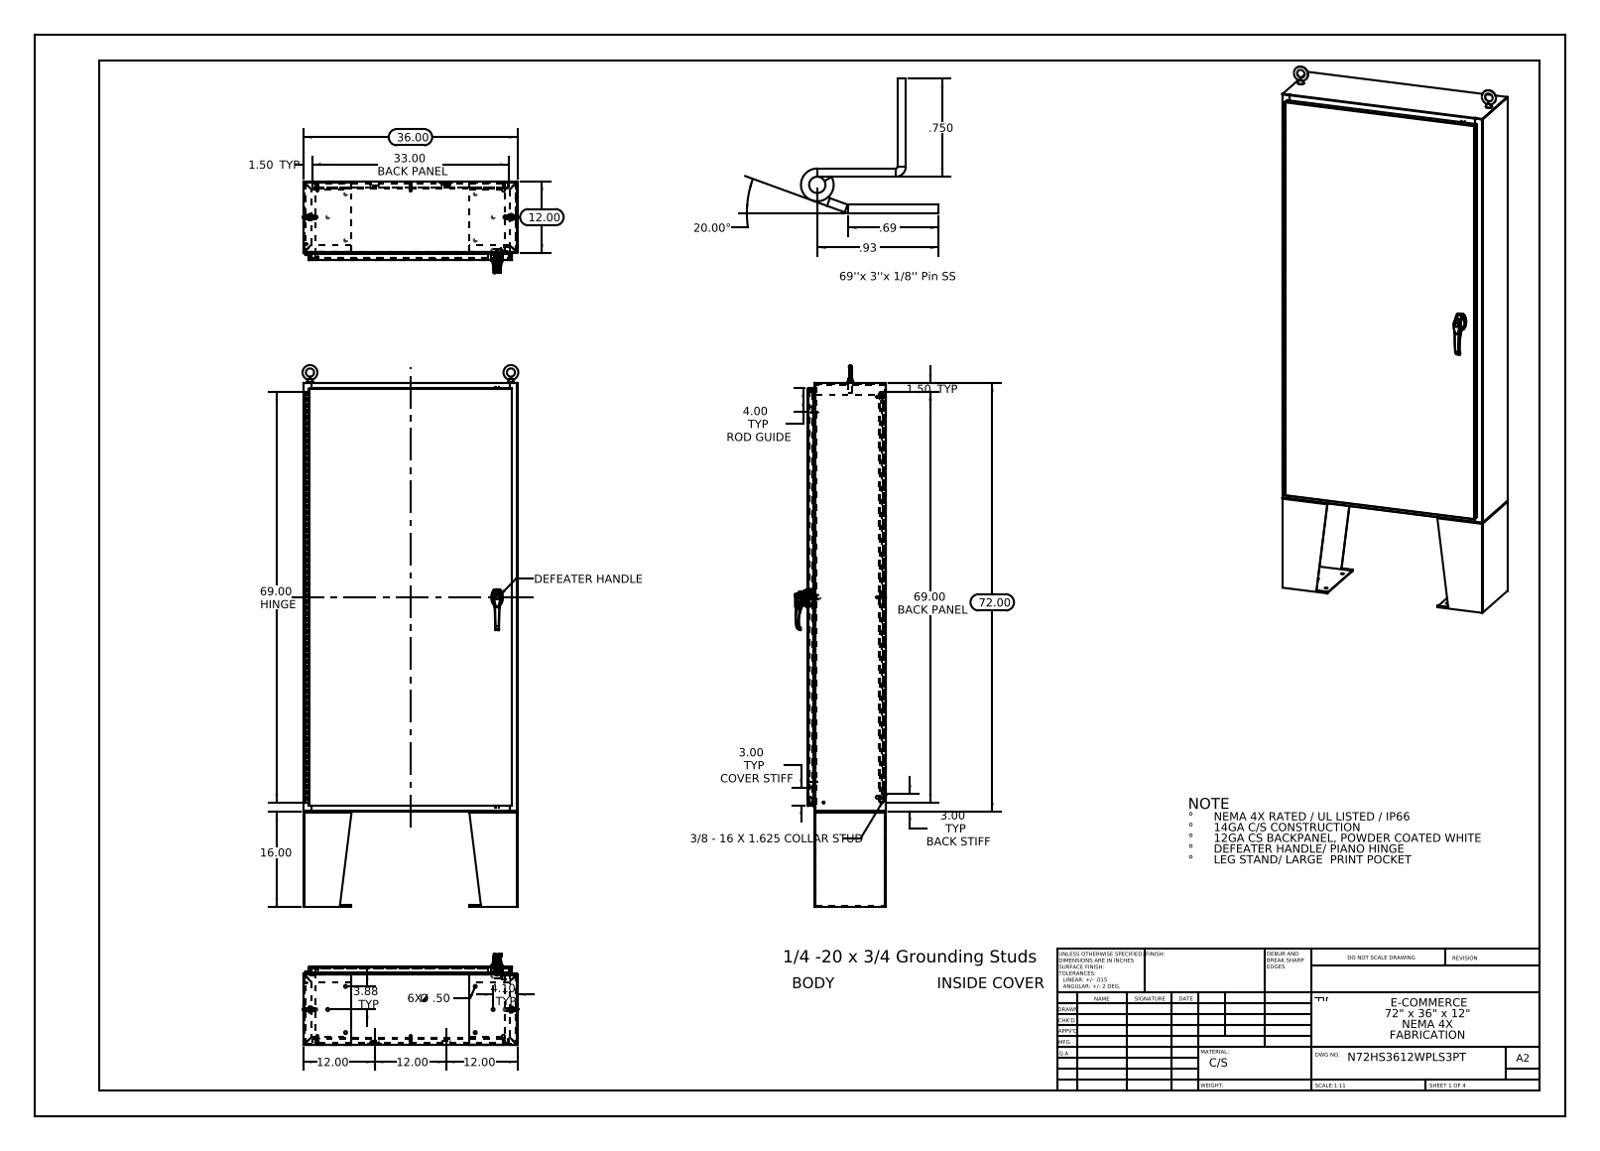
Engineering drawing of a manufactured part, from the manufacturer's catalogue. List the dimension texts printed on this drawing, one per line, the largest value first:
72.00
69.00 HINGE
69.00 BACK PANEL
36.00
33.00 BACK PANEL
20.00°
16.00
12.00
12.00
12.00
12.00
4.10 TYP
4.00 TYP ROD GUIDE
3.88 TYP
3.00 TYP COVER STIFF
3.00 TYP BACK STIFF
1.50 TYP
1.50 TYP
.93
.750
.69
6X Ø .50
